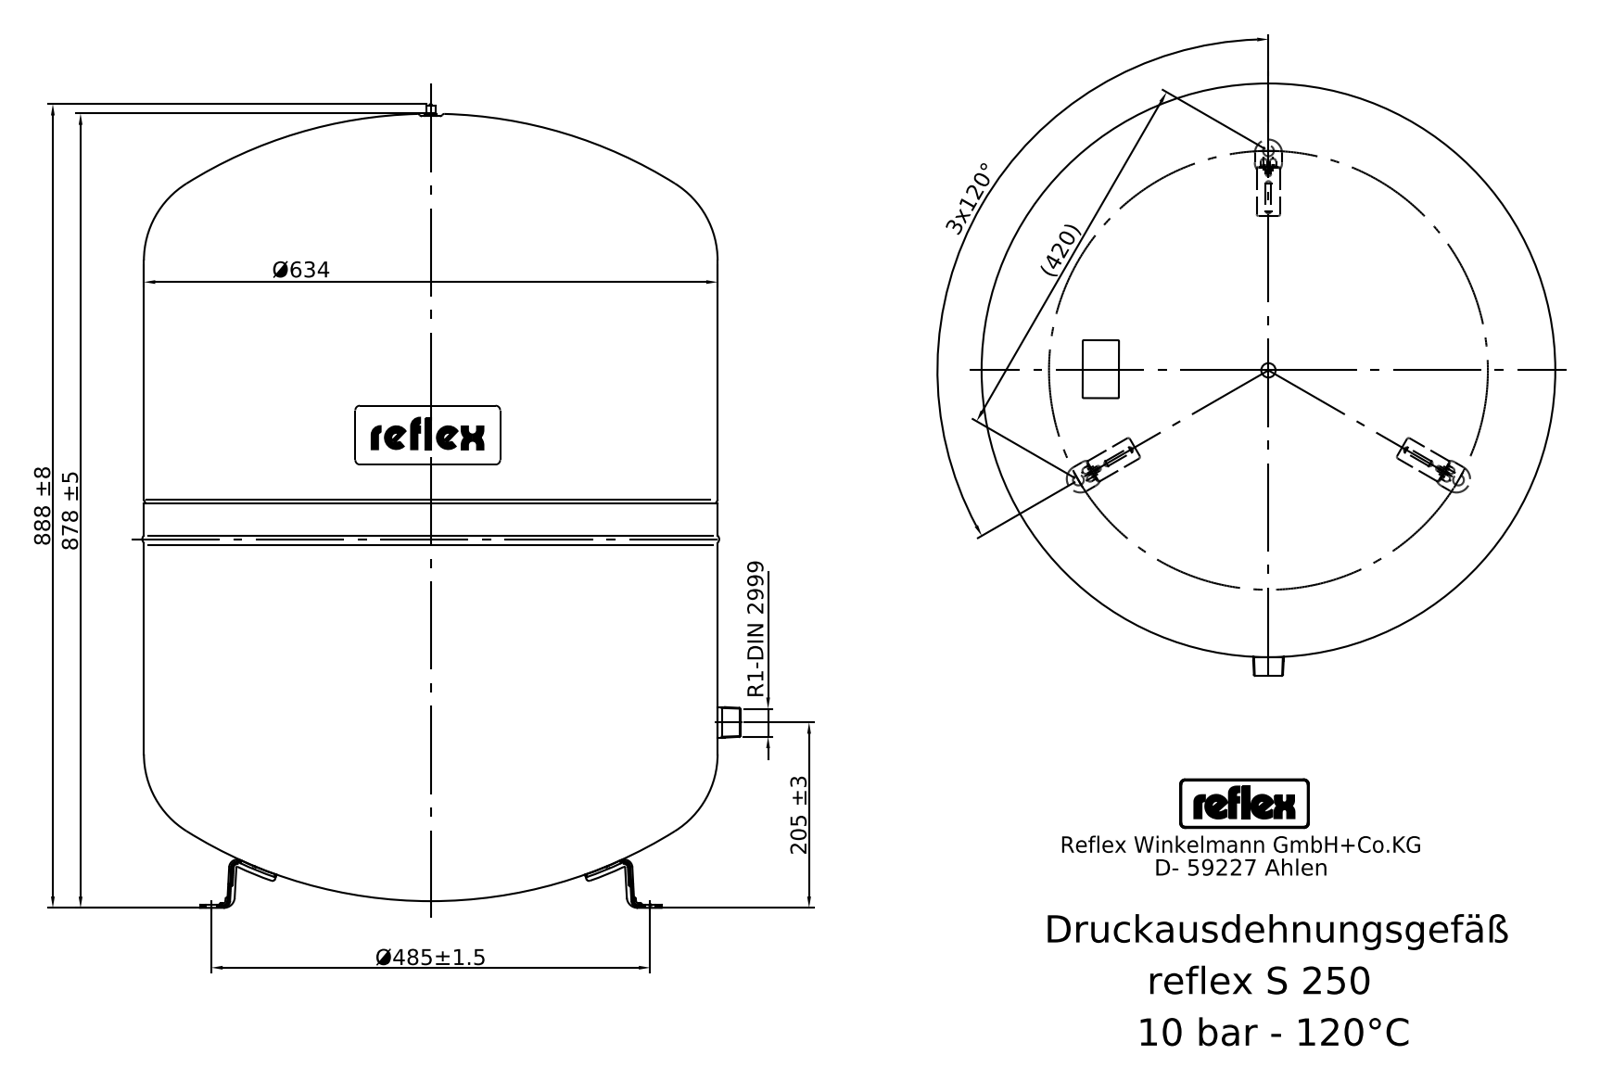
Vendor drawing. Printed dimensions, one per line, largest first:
888 ±8
878 ±5
Ø634
Ø485±1.5
(420)
205 ±3
3x120°
R1-DIN 2999
